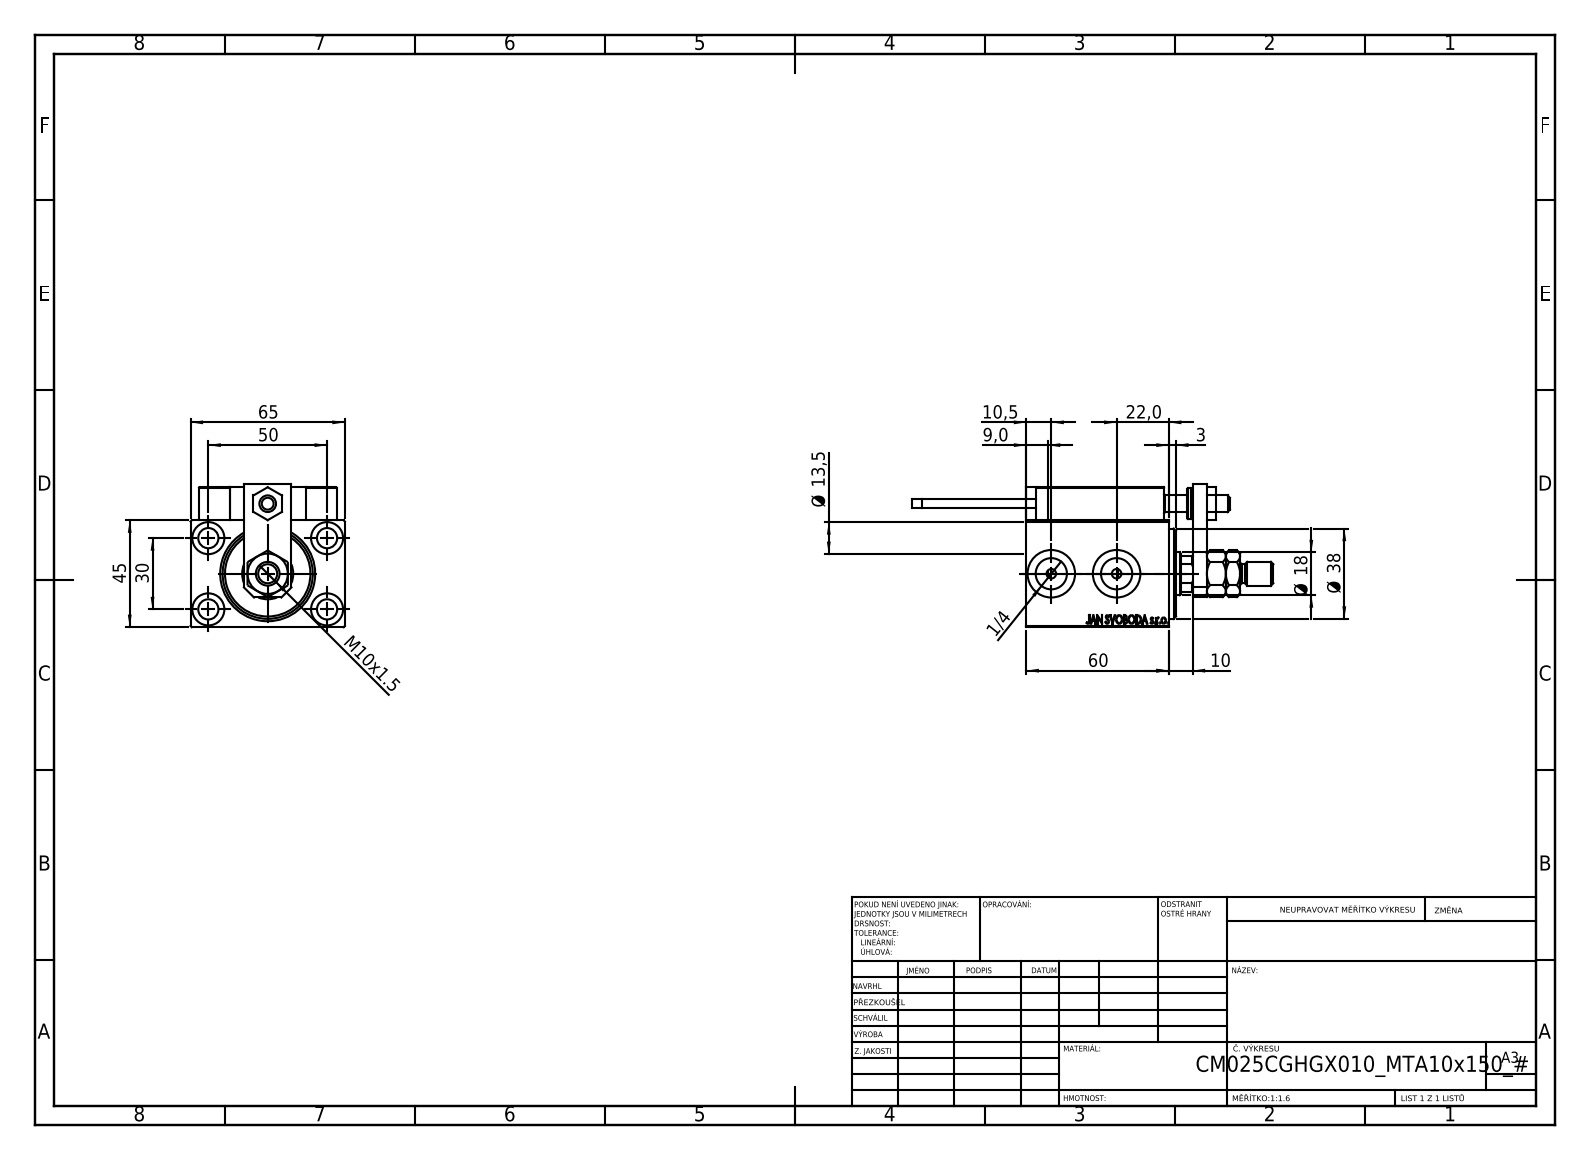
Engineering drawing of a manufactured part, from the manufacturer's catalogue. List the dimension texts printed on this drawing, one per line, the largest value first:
65
60
50
45
Ø 38
30
22,0
Ø 18
Ø 13,5
10,5
M10x1.5
10
9,0
3
1/4
